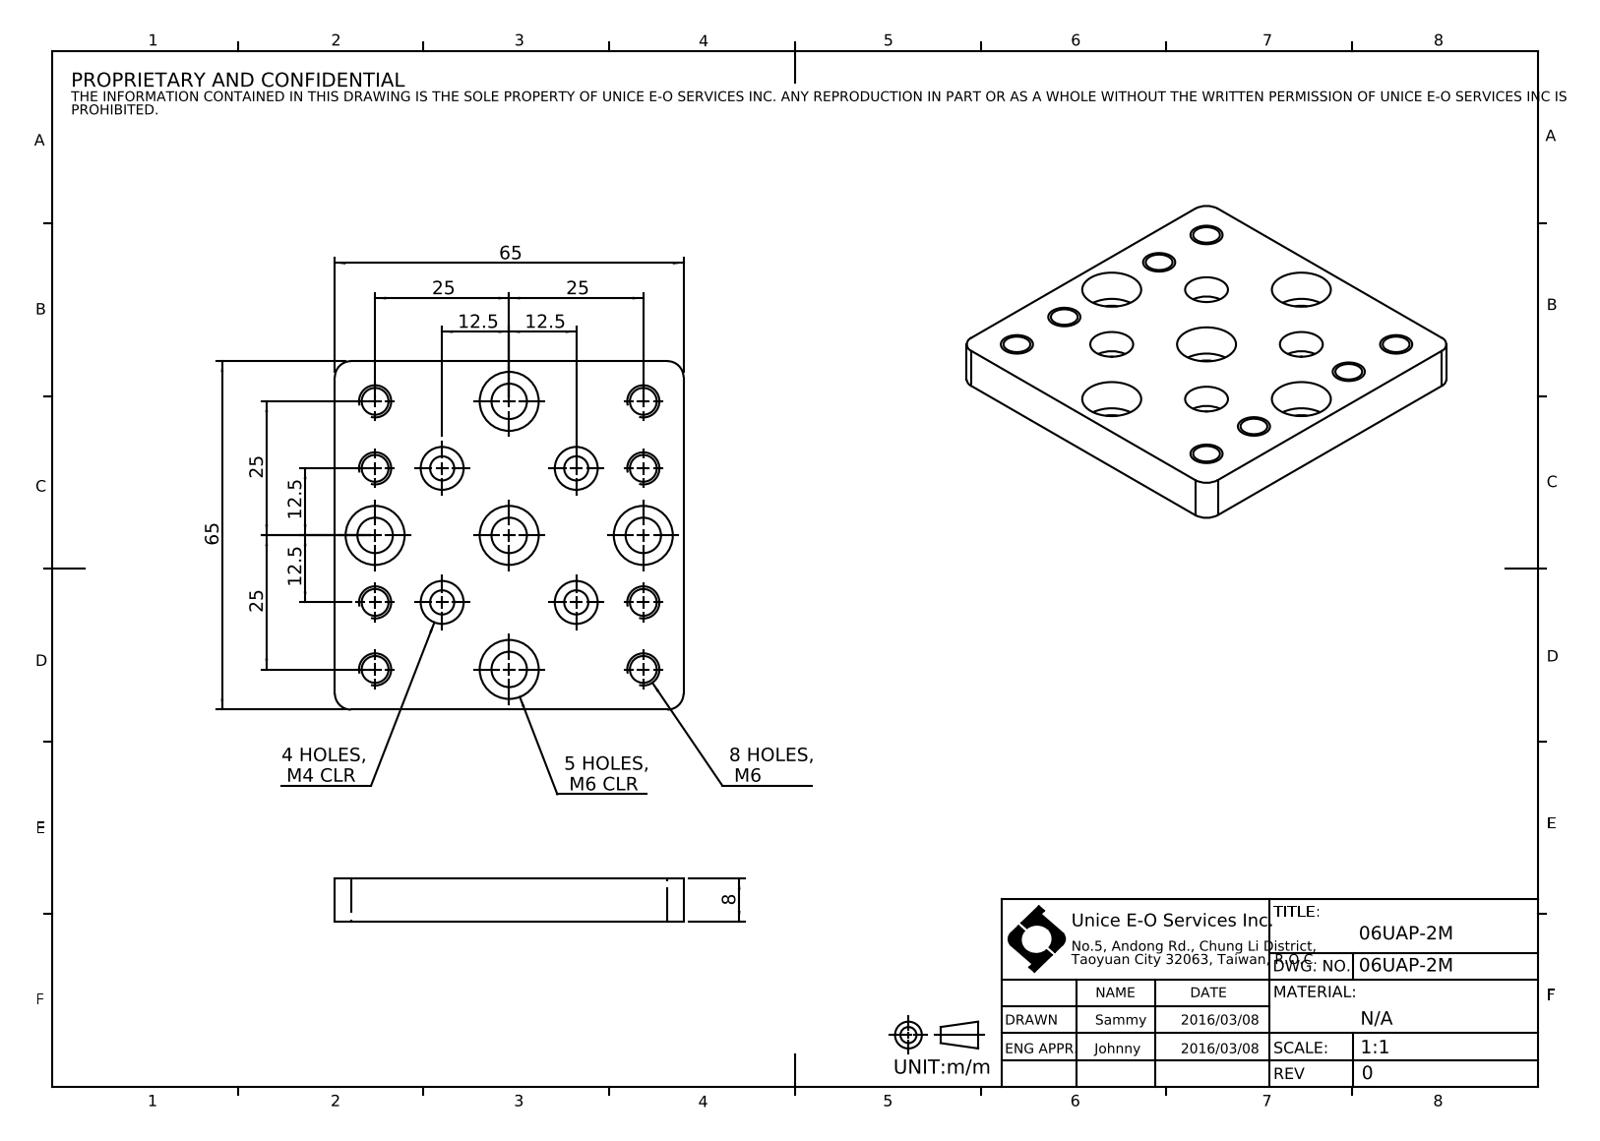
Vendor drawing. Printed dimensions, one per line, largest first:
65
65
25
25
25
25
12.5
12.5
12.5
12.5
8 HOLES, M6
8
5 HOLES, M6 CLR
4 HOLES, M4 CLR
